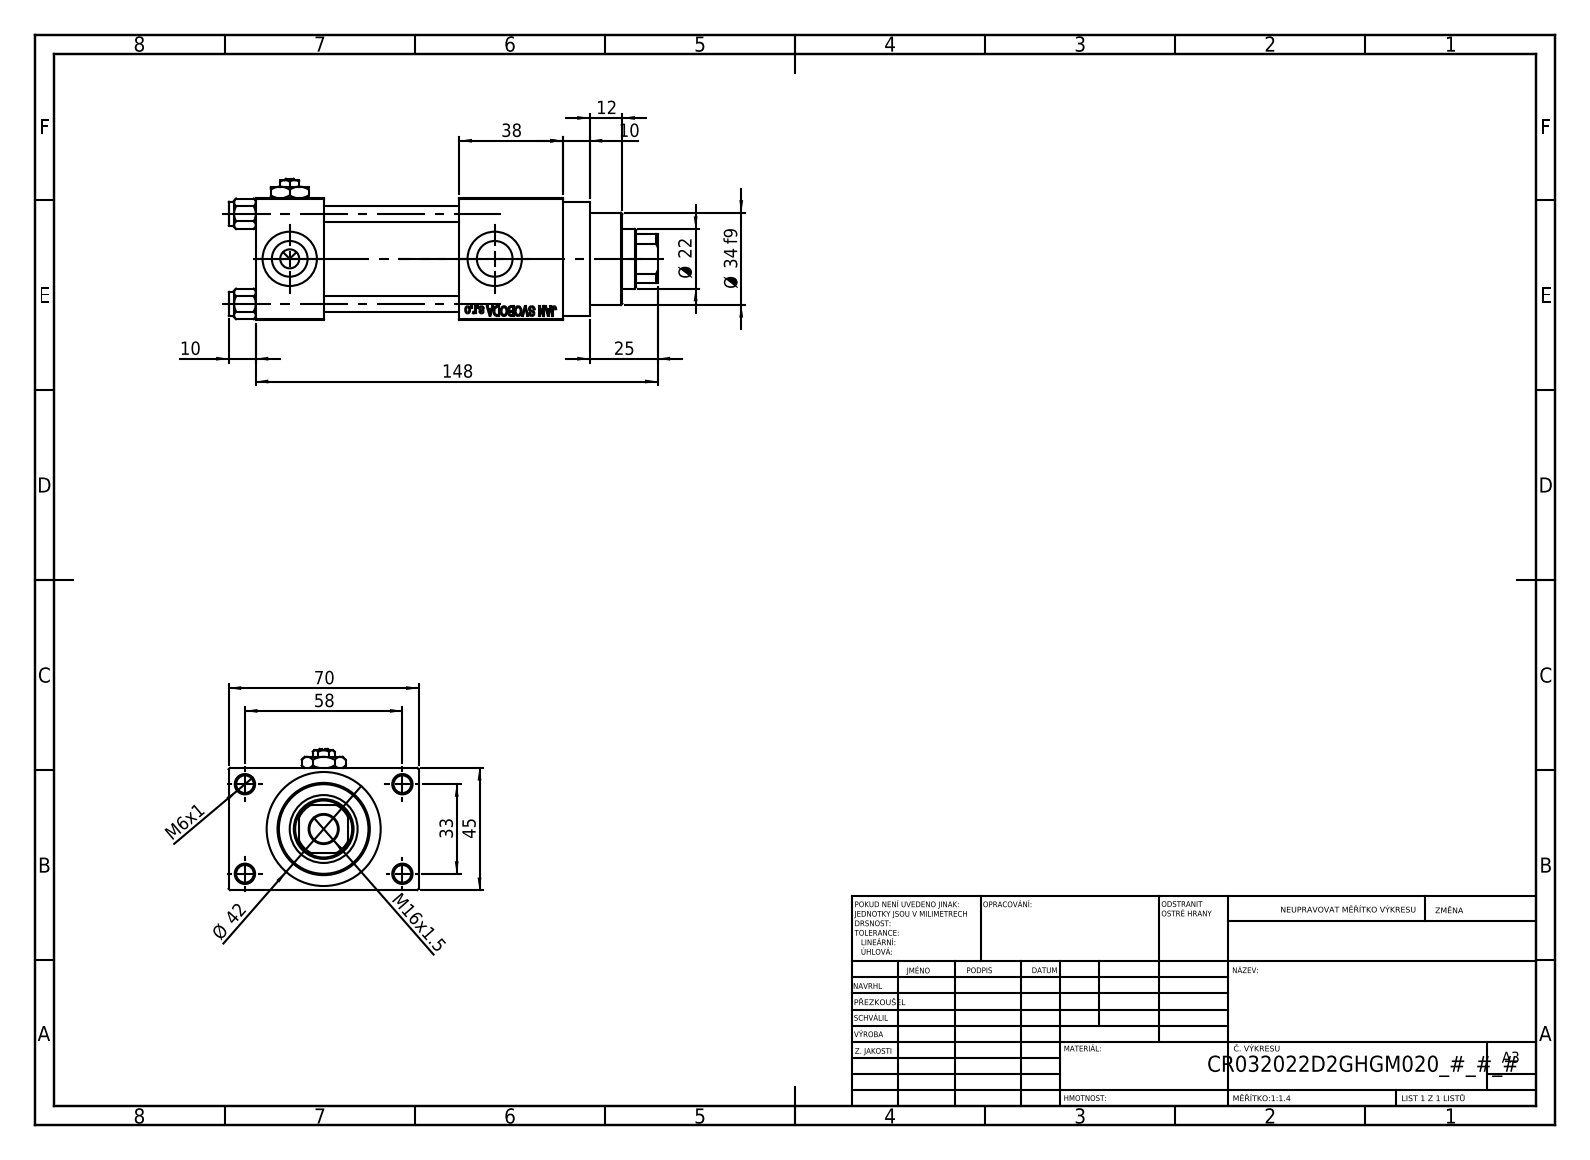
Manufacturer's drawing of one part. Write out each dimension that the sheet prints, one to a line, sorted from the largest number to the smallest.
148
70
58
45
Ø 42
38
Ø 34 f9
33
25
Ø 22
M16x1.5
12
10
10
M6x1
